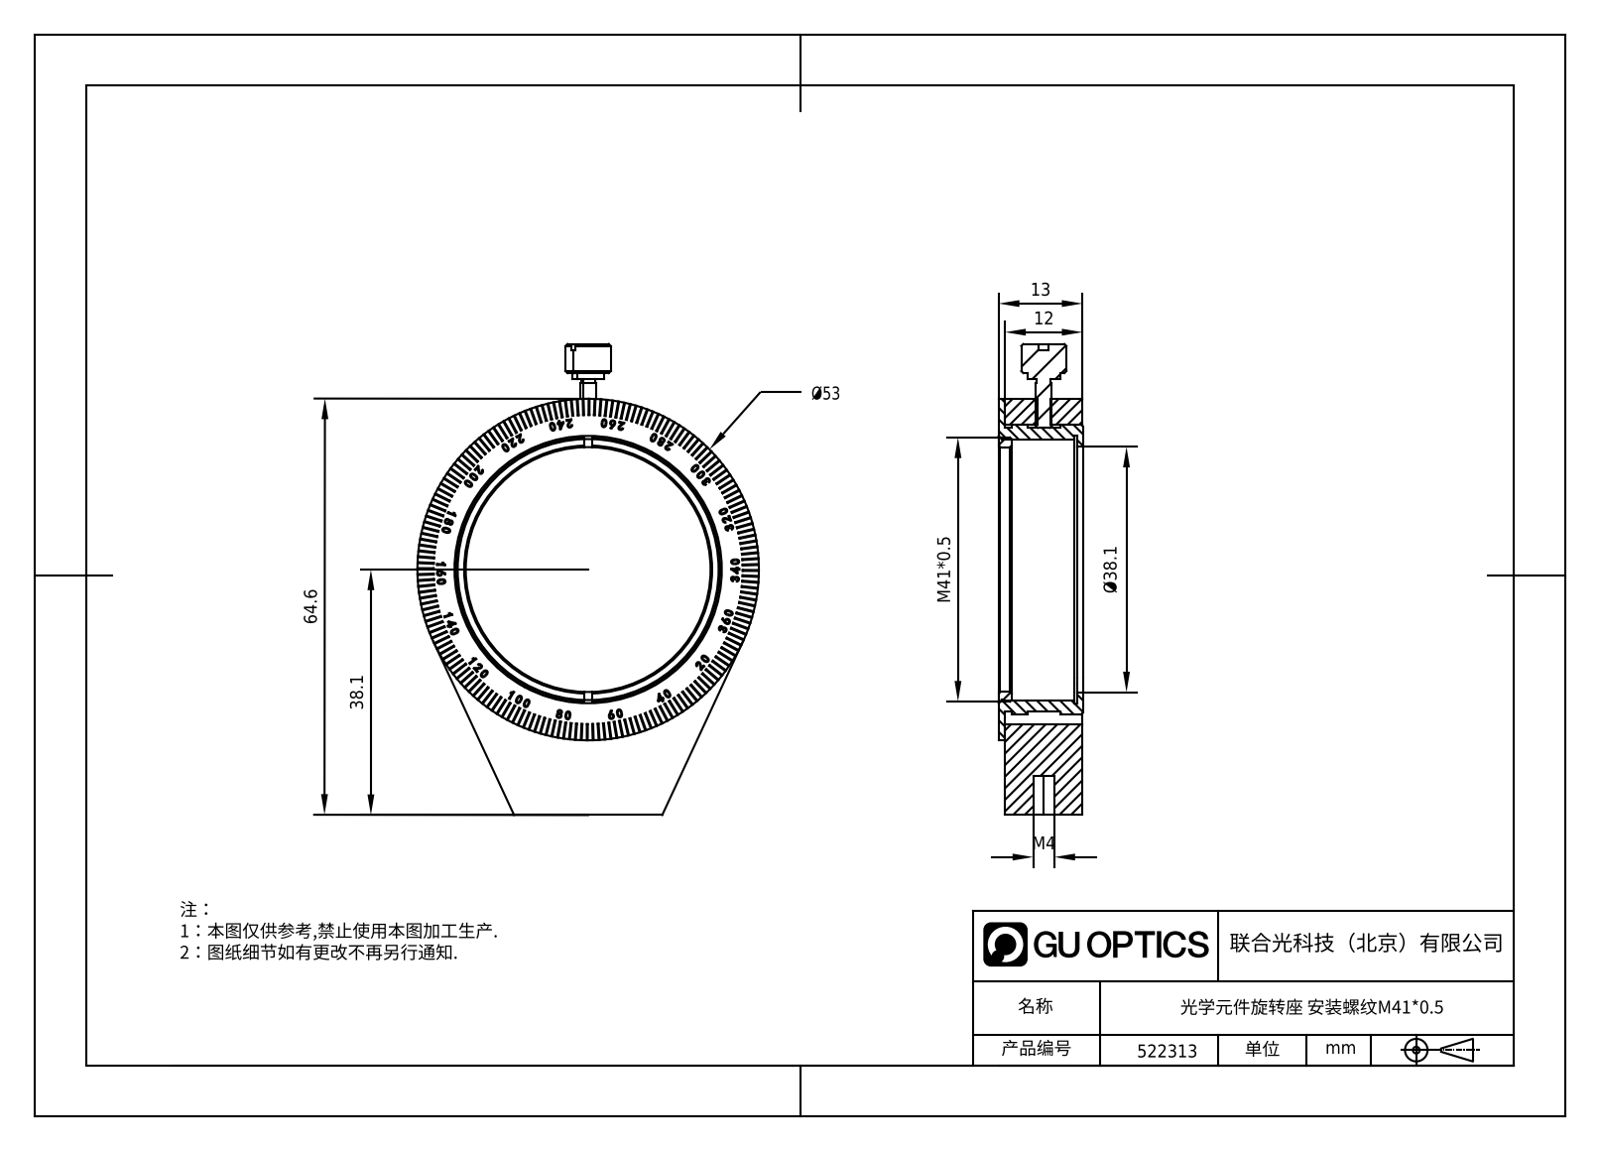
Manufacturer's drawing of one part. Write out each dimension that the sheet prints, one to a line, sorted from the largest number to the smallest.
64.6
M41*0.5
38.1
Ø38.1
13
12
M4
